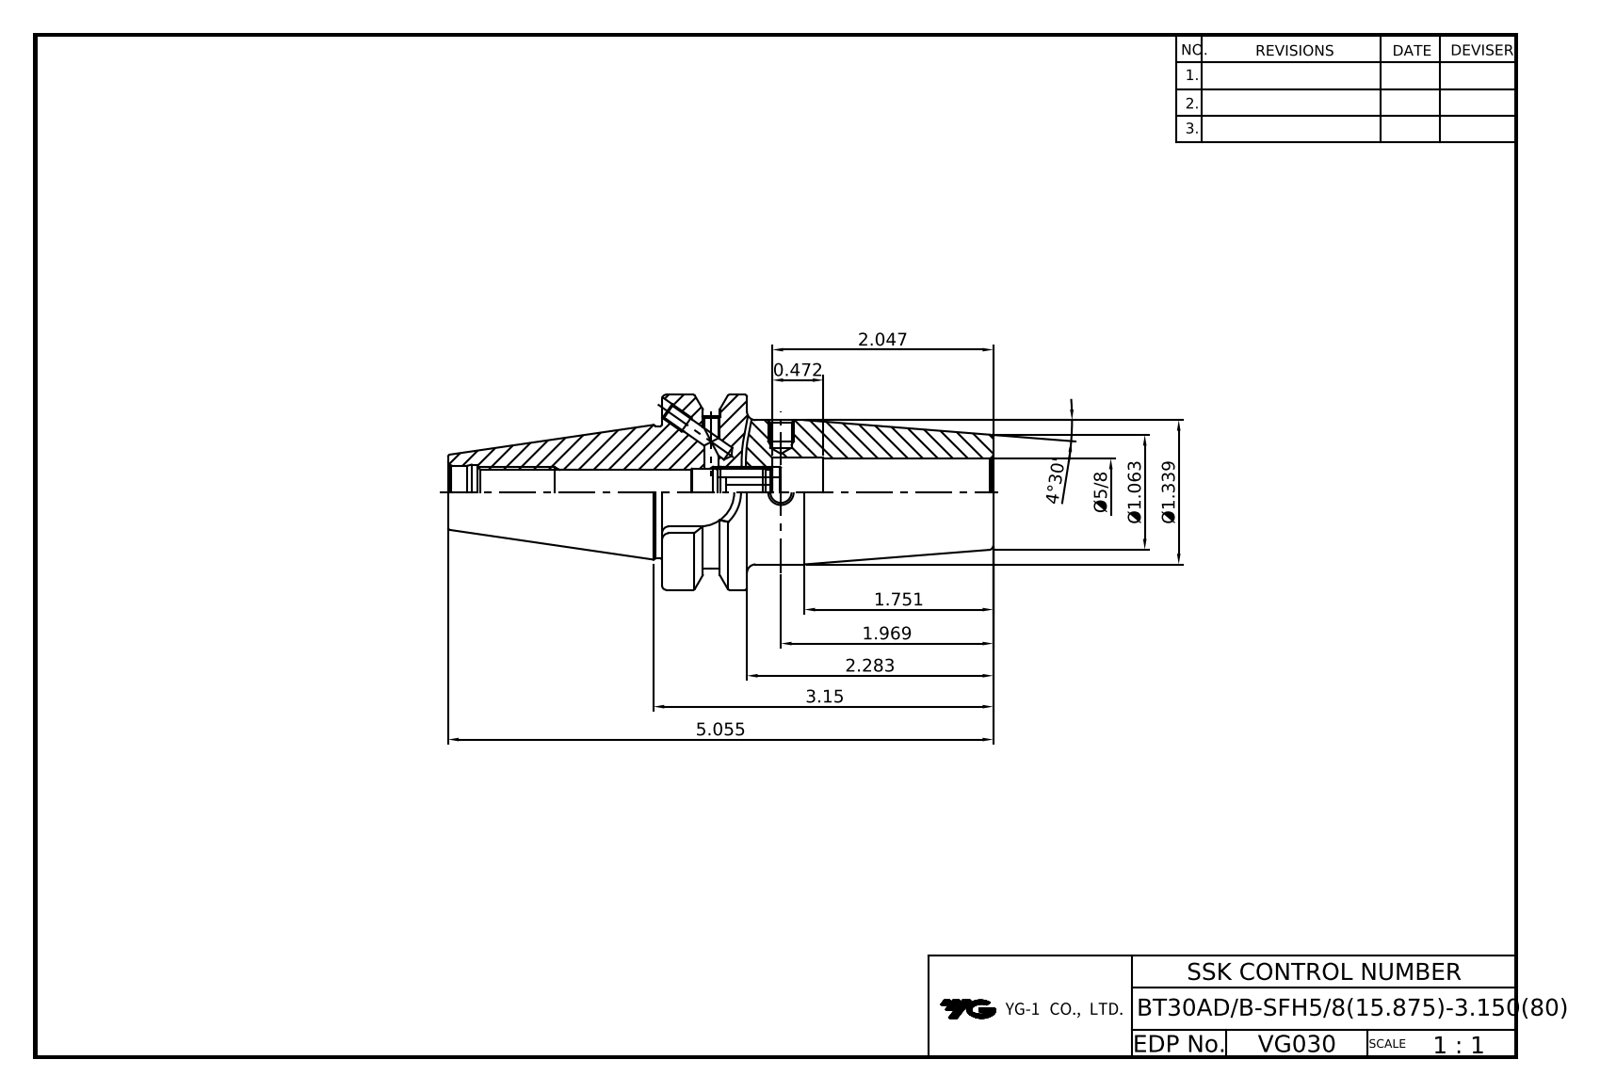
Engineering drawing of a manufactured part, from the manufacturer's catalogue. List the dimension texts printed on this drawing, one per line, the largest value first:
5.055
4°30'
3.15
2.283
2.047
1.969
1.751
Ø1.339
Ø1.063
0.472
